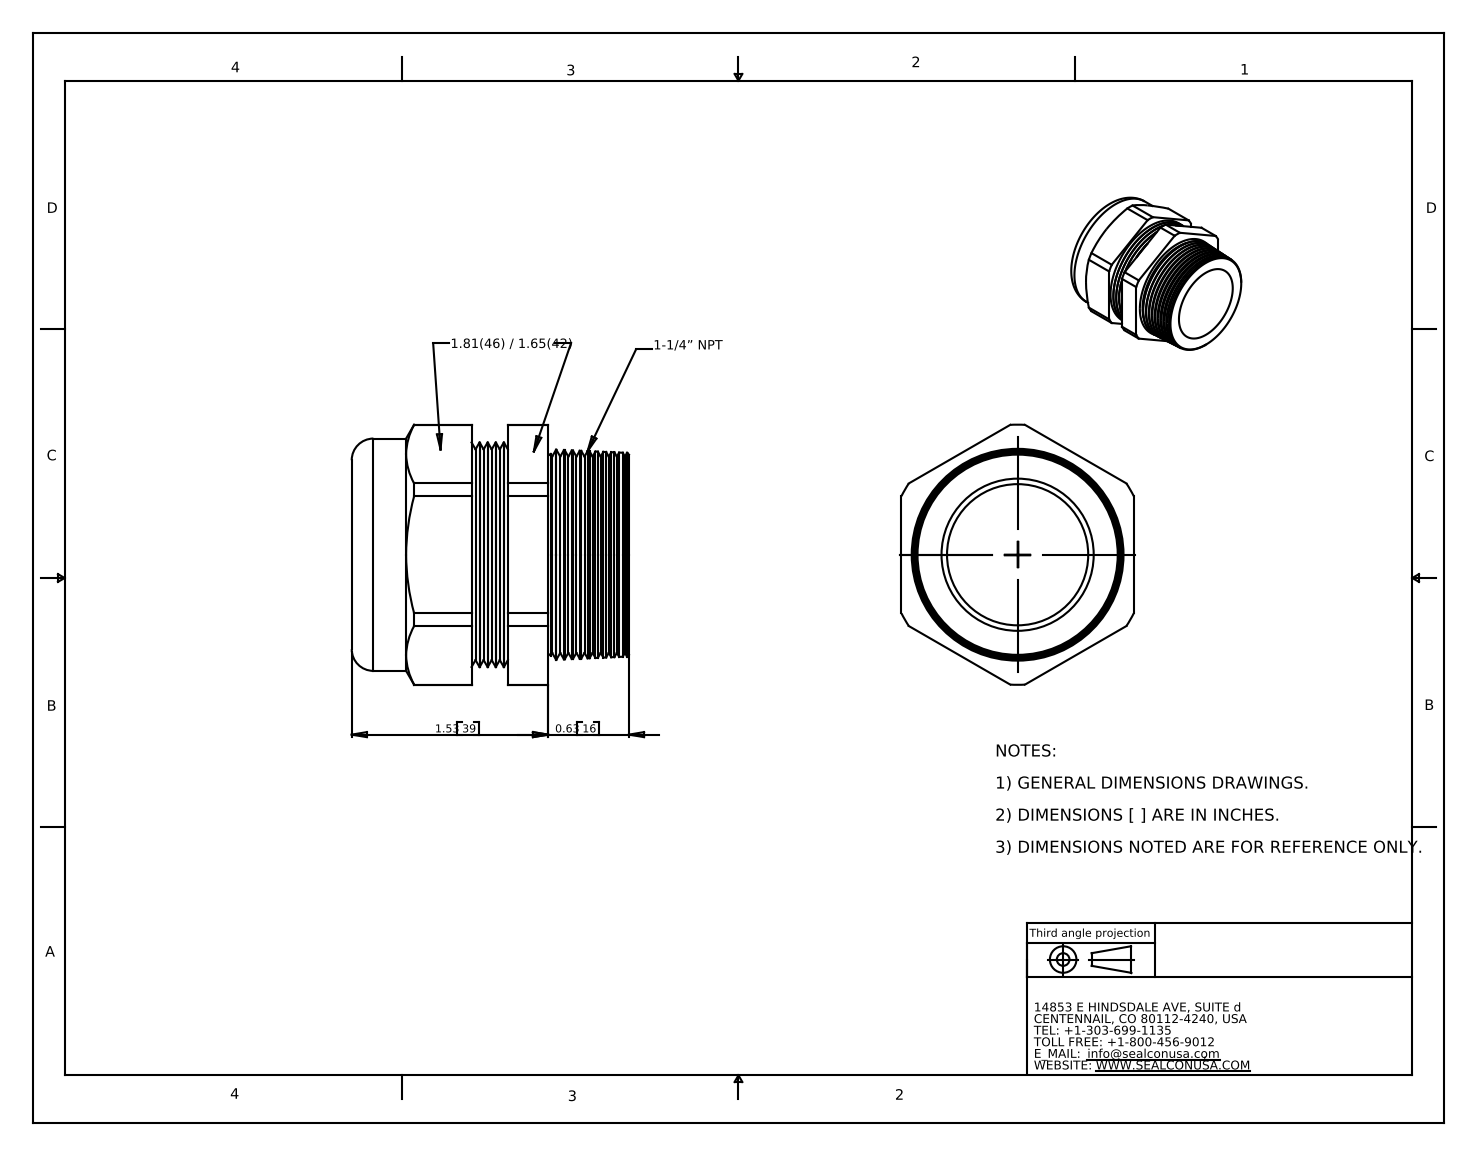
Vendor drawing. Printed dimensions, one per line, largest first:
1.53 39
0.63 16
